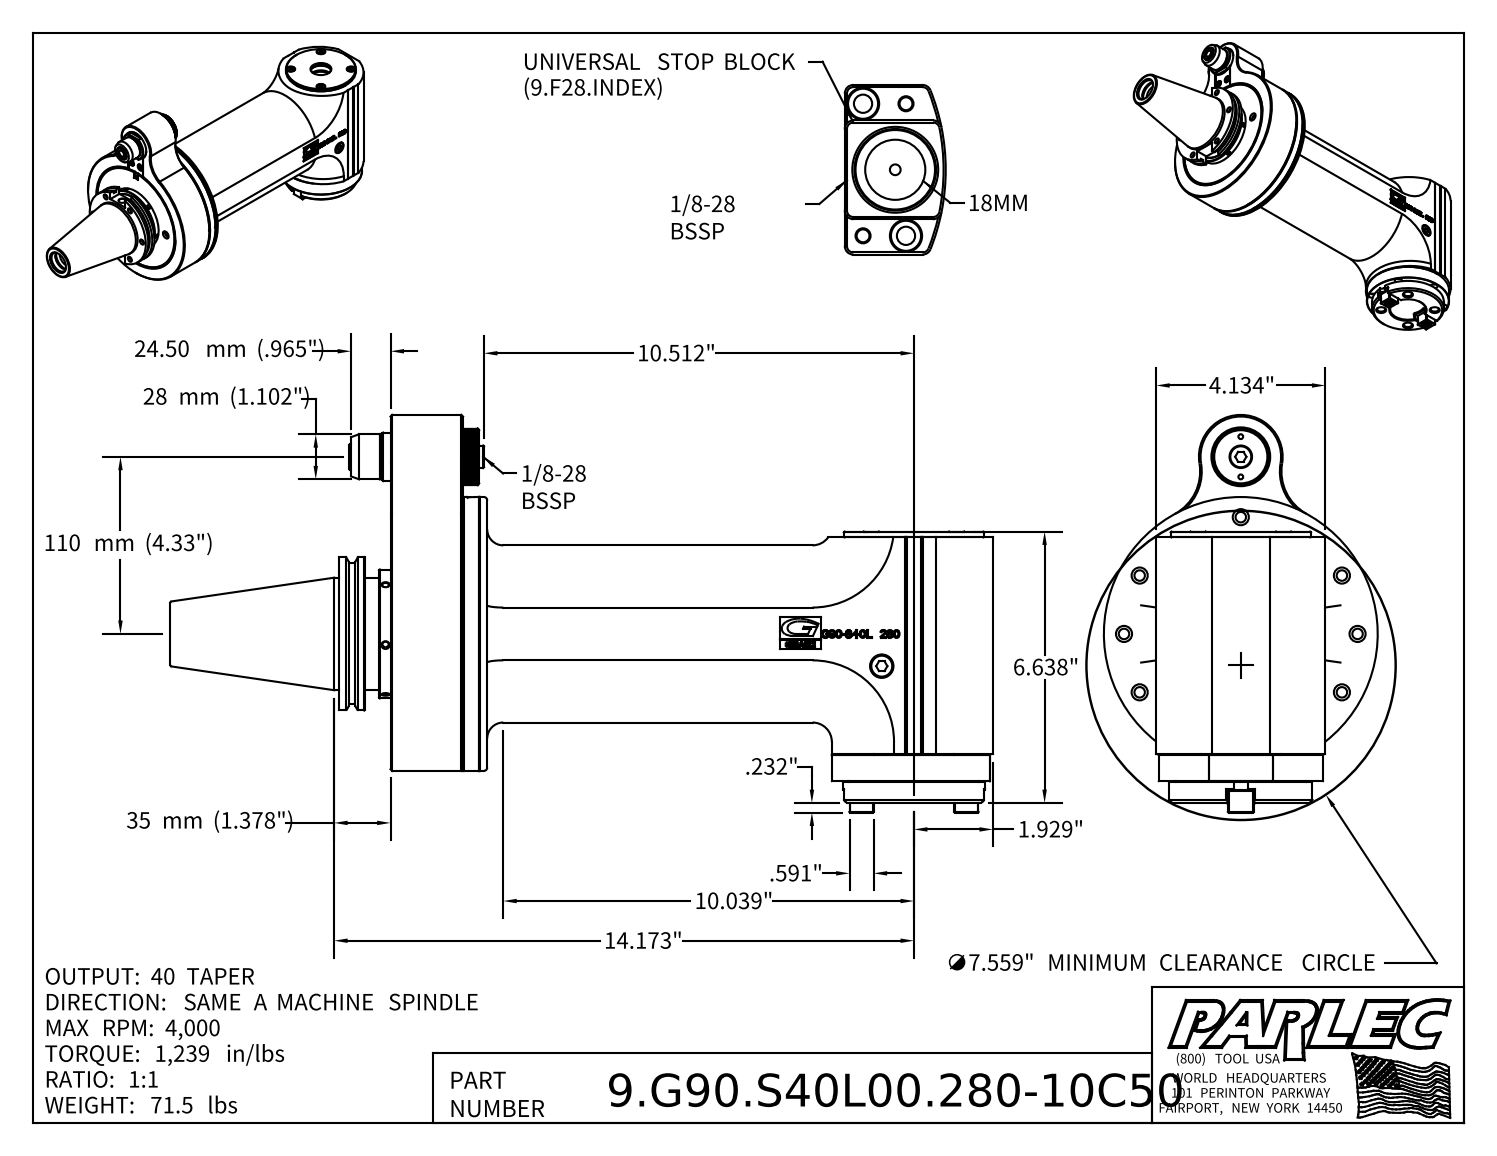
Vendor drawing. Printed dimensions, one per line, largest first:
110 mm (4.33")
35 mm (1.378")
28 mm (1.102")
24.50 mm (.965")
14.173"
10.512"
10.039"
∅7.559" MINIMUM CLEARANCE CIRCLE
6.638"
4.134"
1.929"
.591"
.232"
